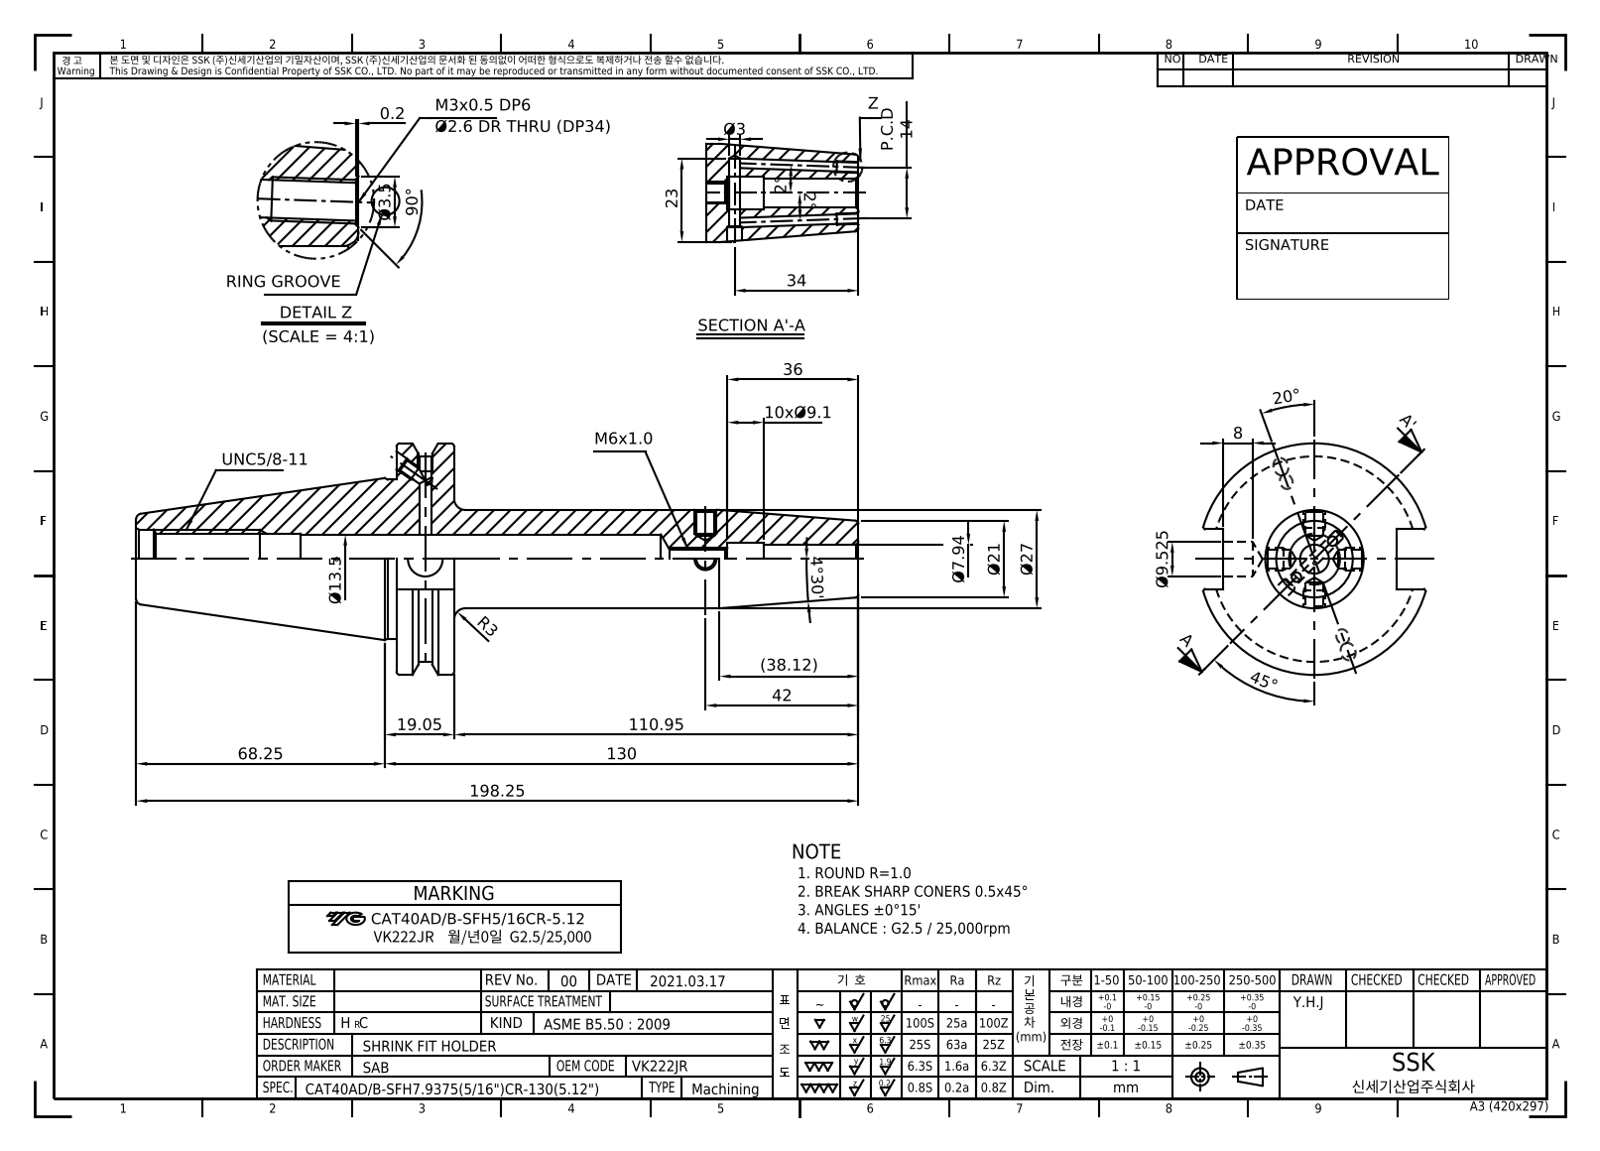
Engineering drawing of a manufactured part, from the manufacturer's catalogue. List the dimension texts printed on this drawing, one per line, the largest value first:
198.25
130
110.95
90°
68.25
45°
42
(38.12)
36
34
Ø27
23
Ø21
20°
19.05
P.C.D 14
Ø13.5
Ø9.525
10xØ9.1
8
Ø7.94
4°30'
Ø3.5
R3
Ø3
2°
2°
0.2
